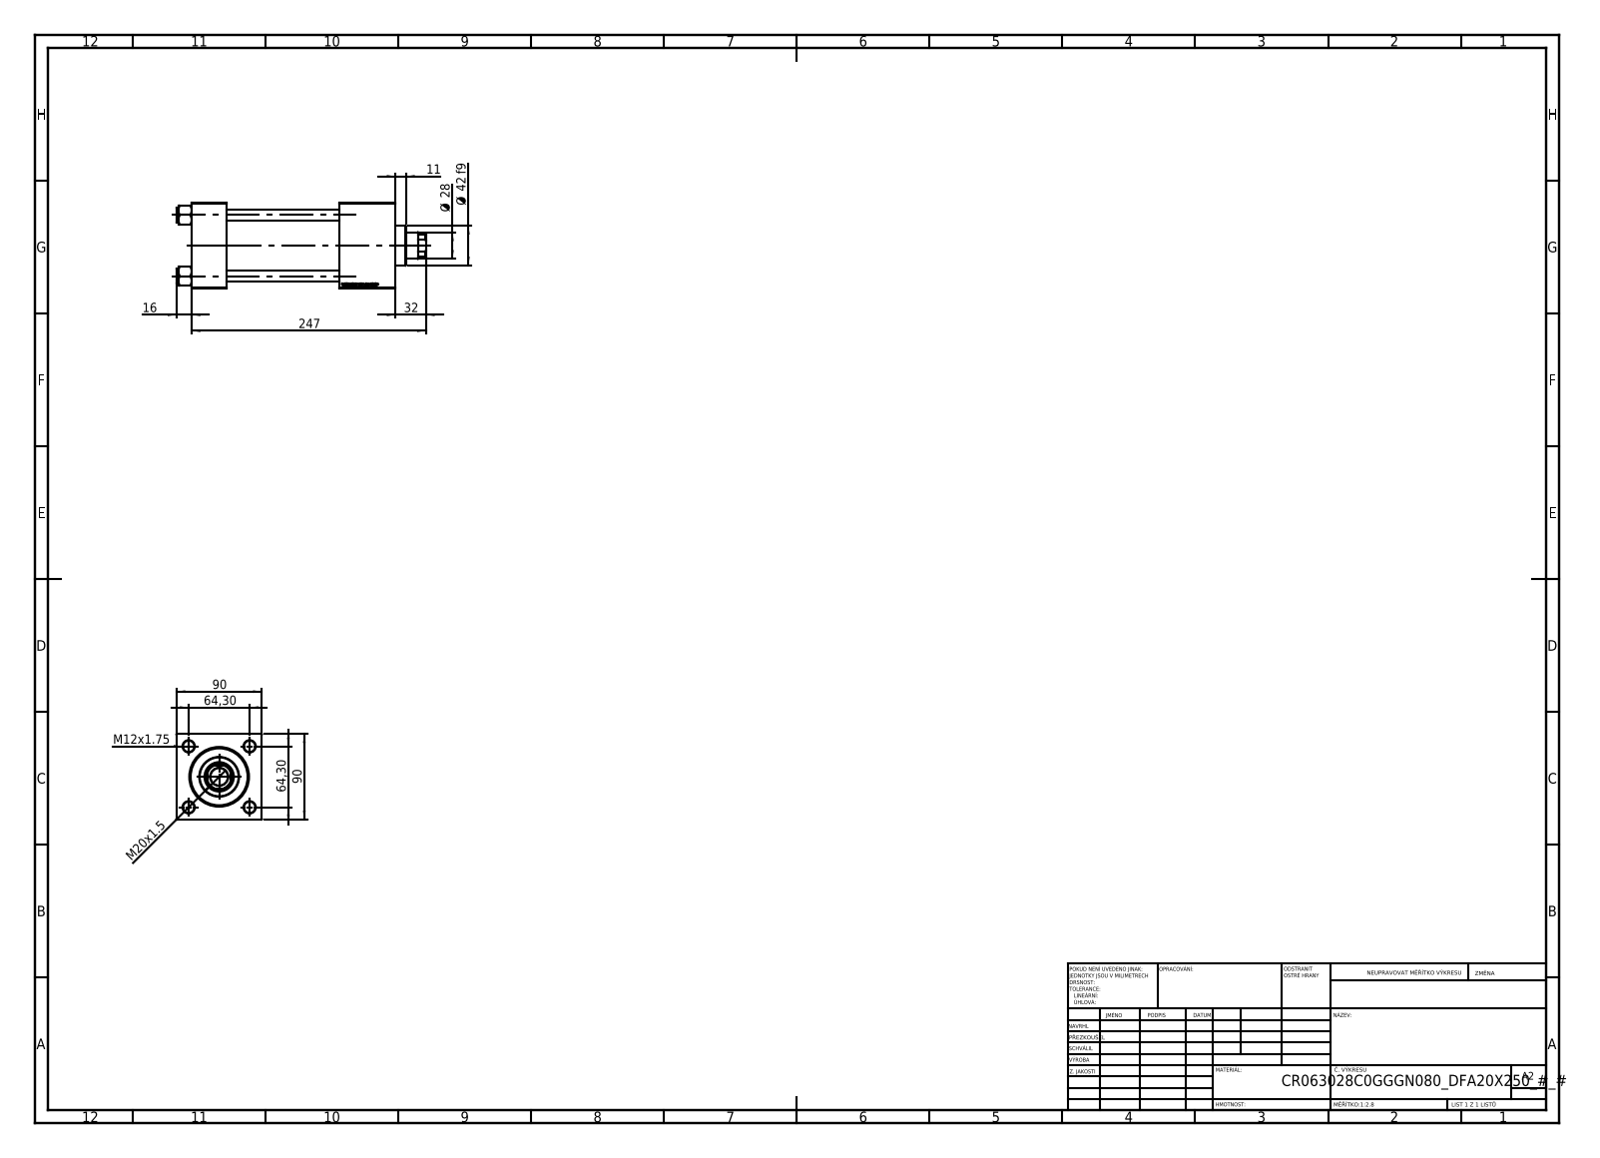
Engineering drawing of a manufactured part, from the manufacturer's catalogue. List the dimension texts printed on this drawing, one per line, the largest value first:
247
90
90
64,30
64,30
Ø 42 f9
32
Ø 28
M20x1.5
16
M12x1.75
11
